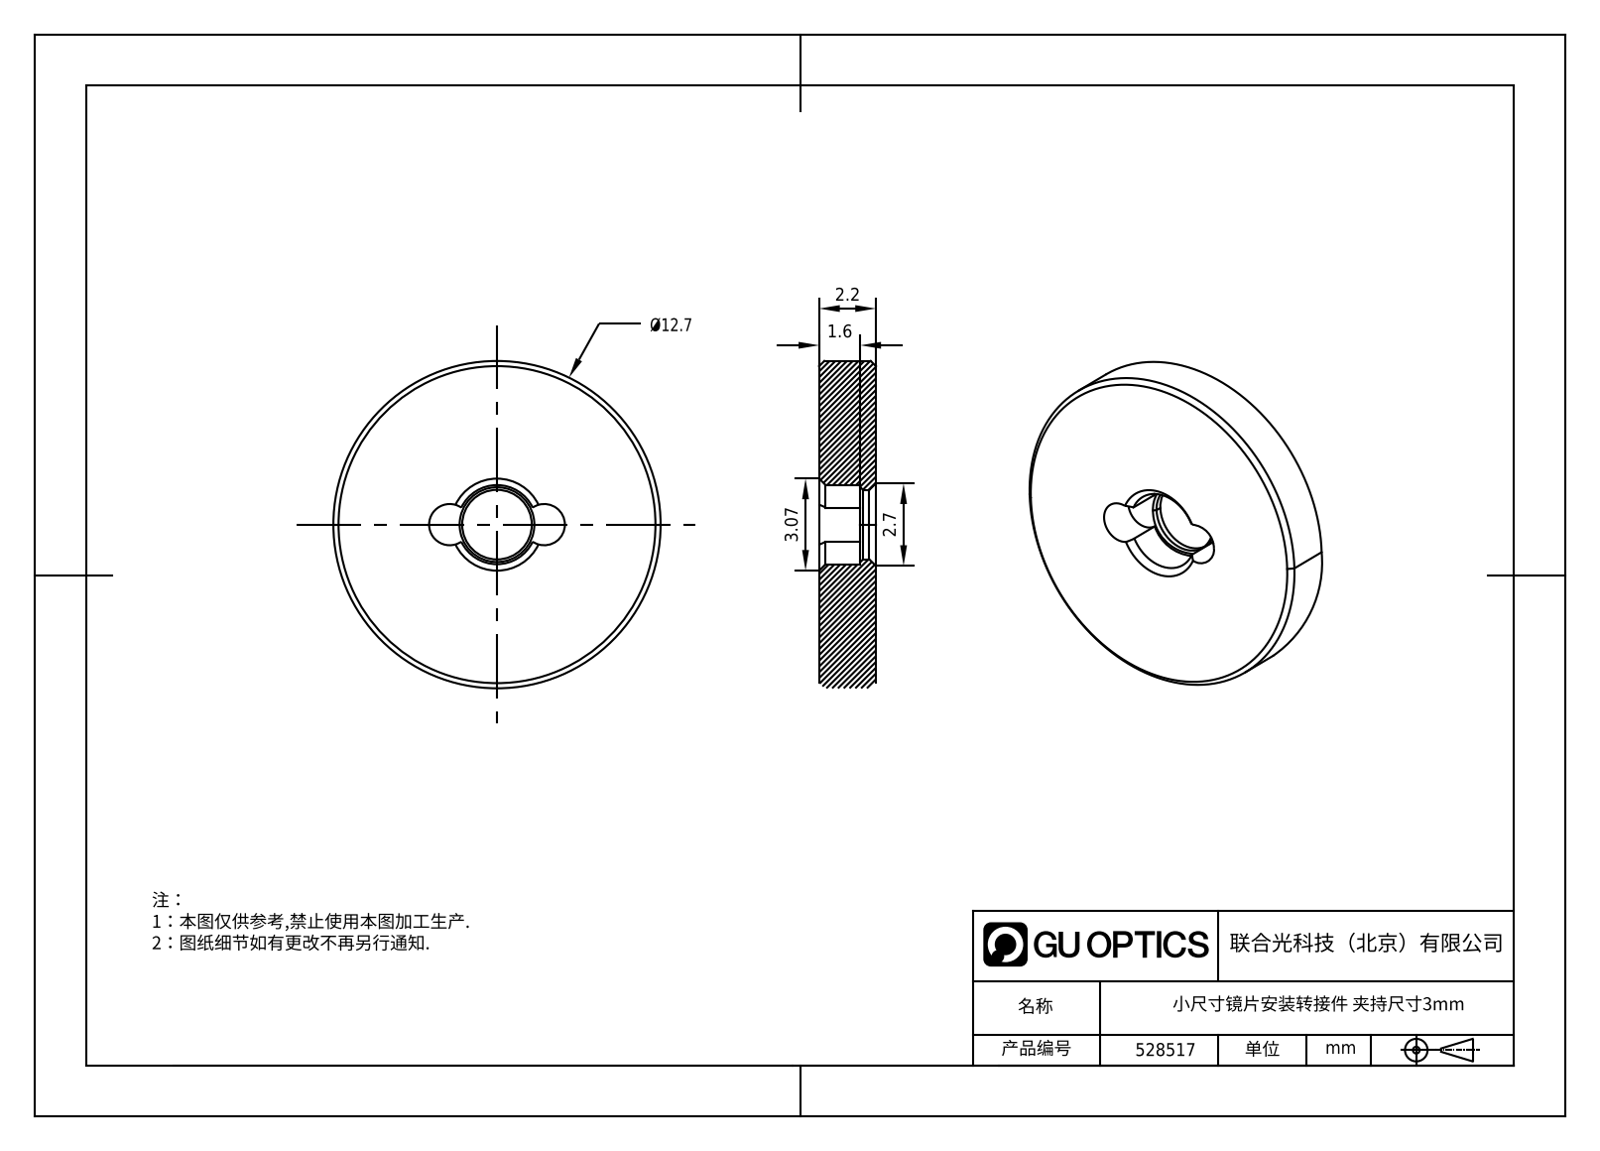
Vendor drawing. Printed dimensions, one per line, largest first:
3.07
2.7
2.2
1.6
